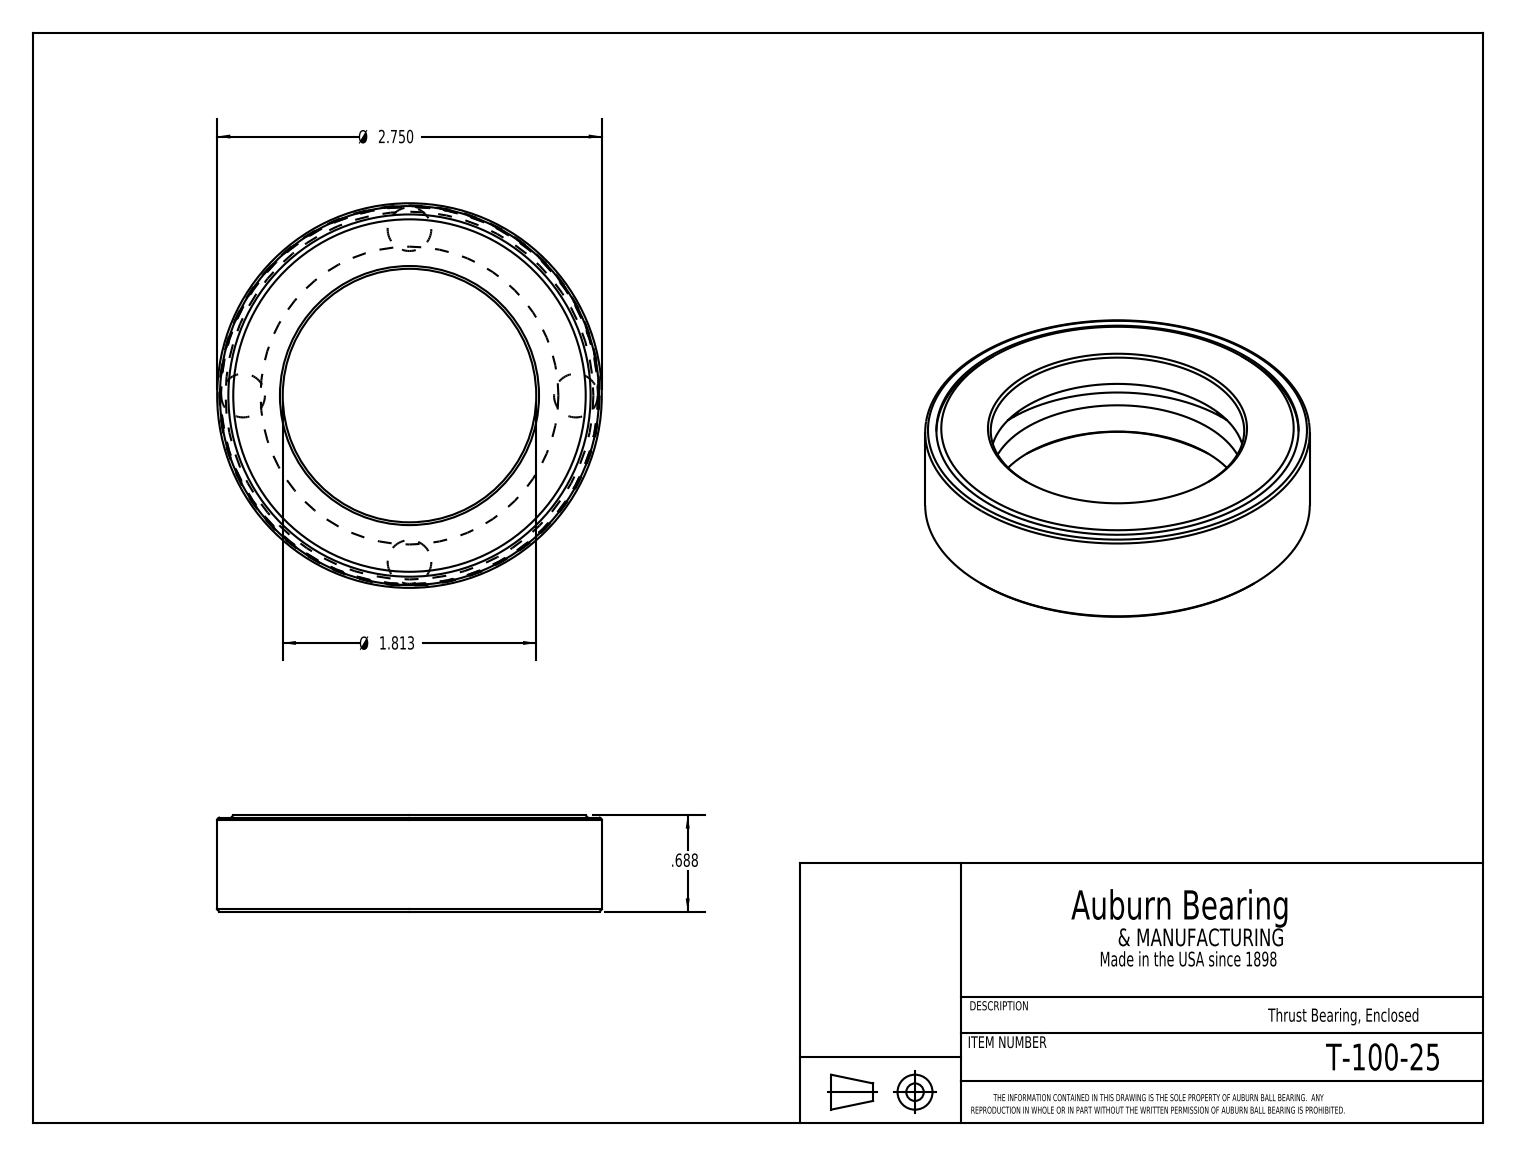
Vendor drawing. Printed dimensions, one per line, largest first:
Ø 2.750
Ø 1.813
.688
